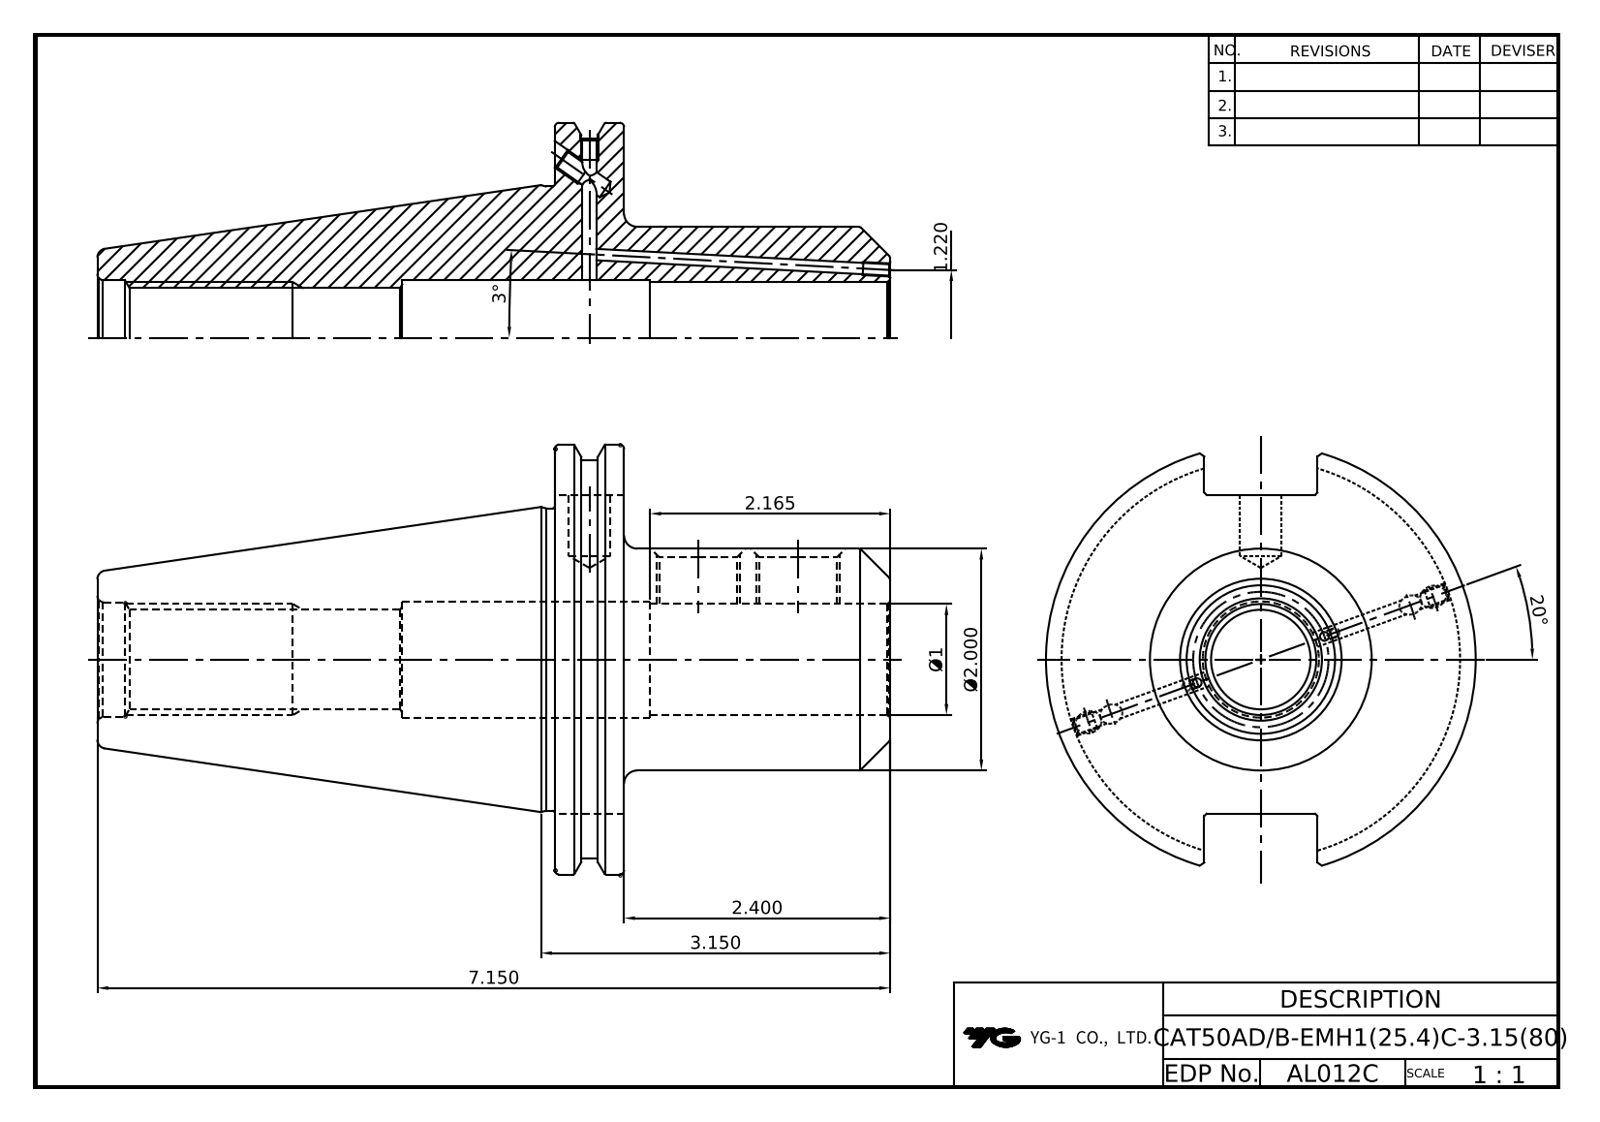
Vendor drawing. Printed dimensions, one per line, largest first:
20°
7.150
3.150
2.400
2.165
Ø2.000
Ø1
